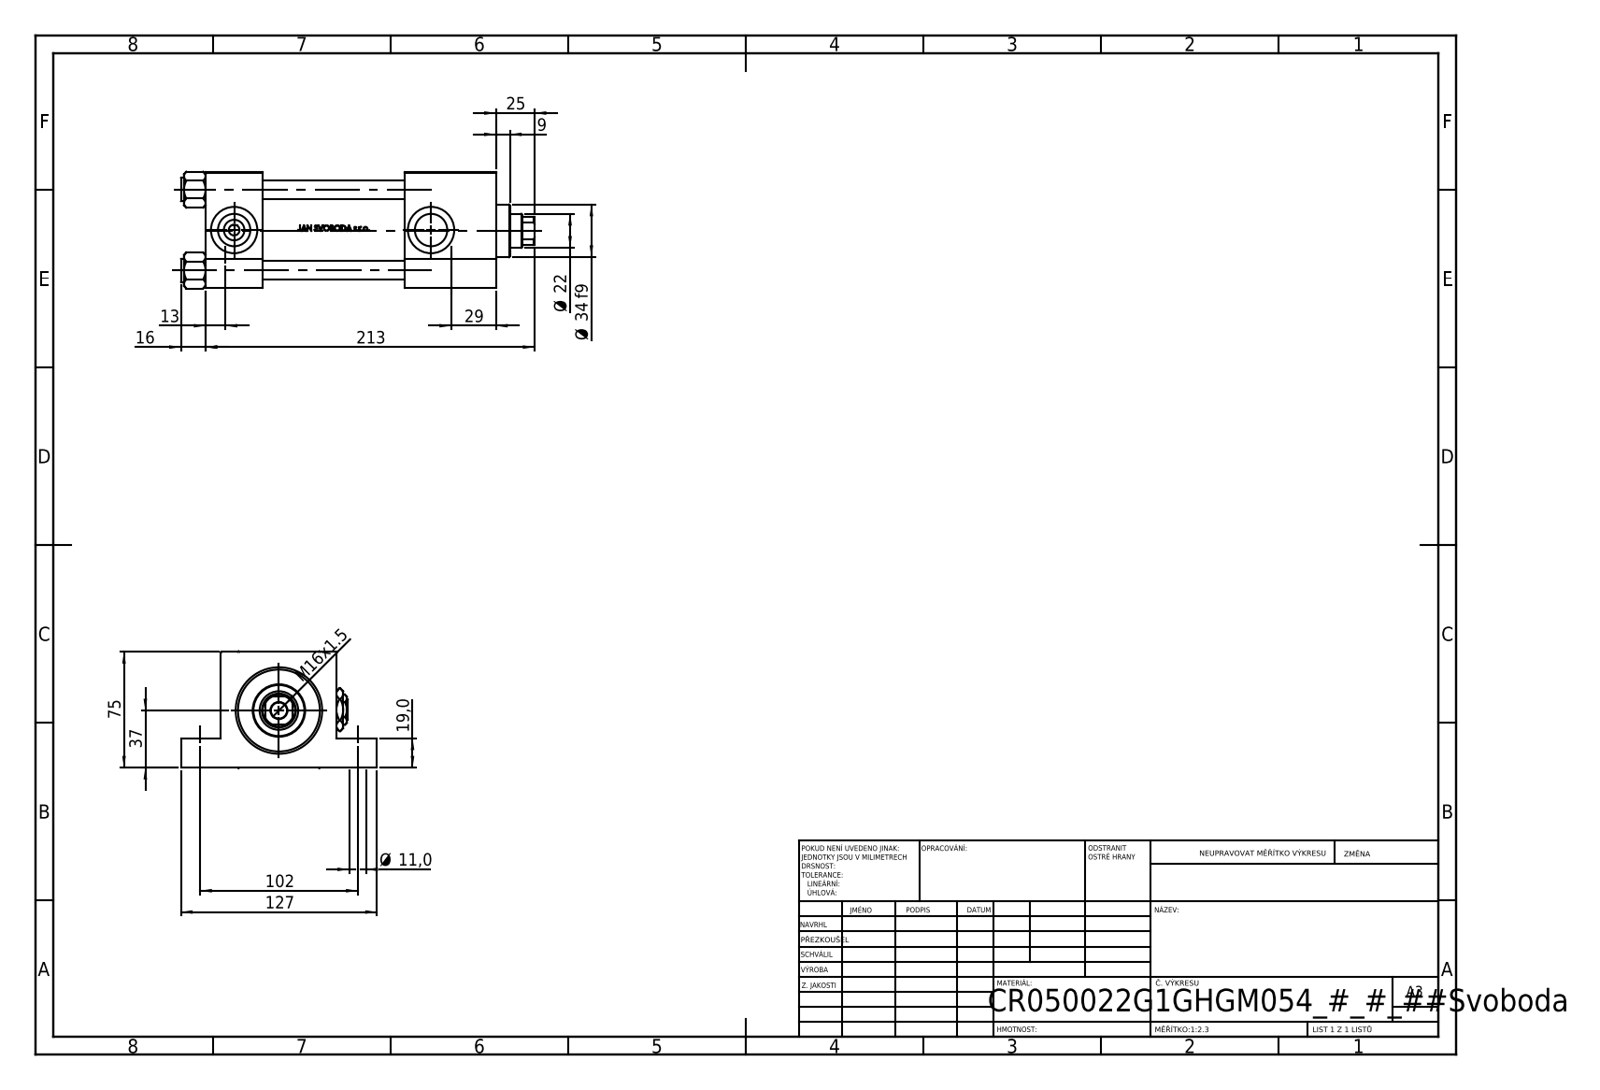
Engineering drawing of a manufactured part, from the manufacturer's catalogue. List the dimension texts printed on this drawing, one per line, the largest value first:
213
127
102
75
37
Ø 34 f9
29
25
Ø 22
19,0
16
M16x1.5
13
Ø 11,0
9
